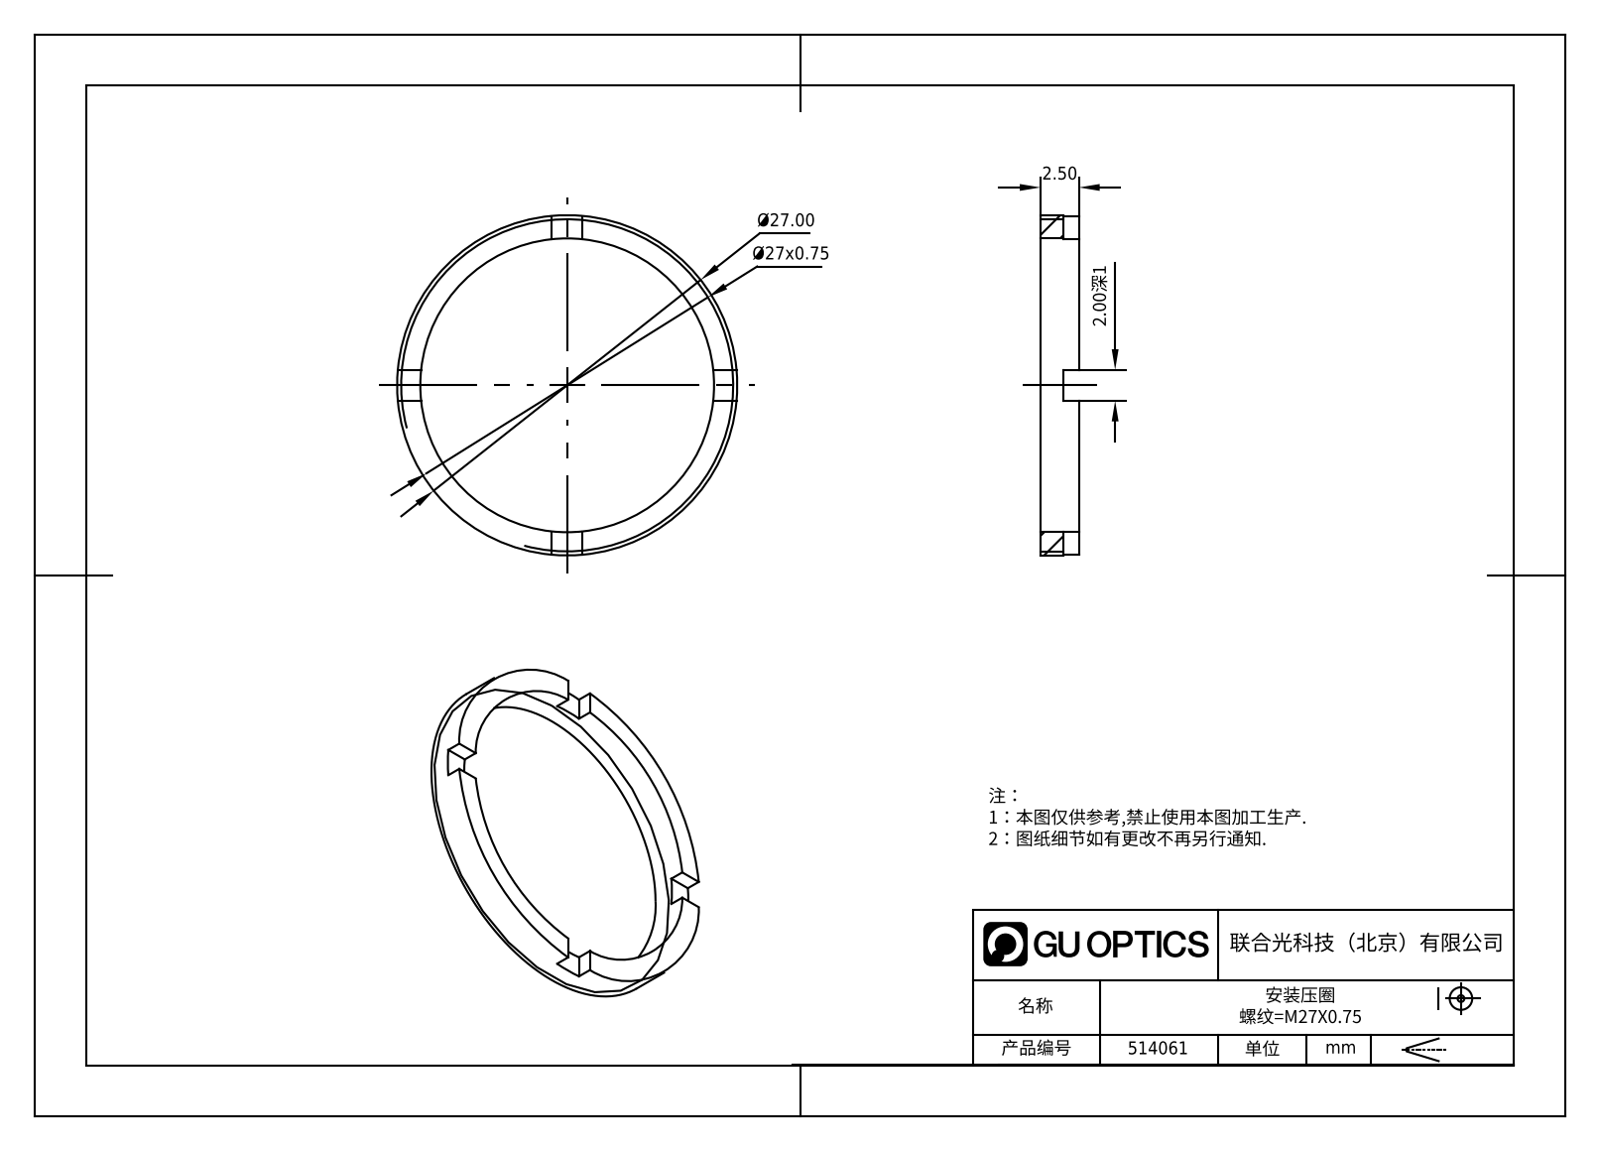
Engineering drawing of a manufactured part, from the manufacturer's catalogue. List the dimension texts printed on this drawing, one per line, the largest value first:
Ø27.00
Ø27x0.75
2.50
2.00深1
